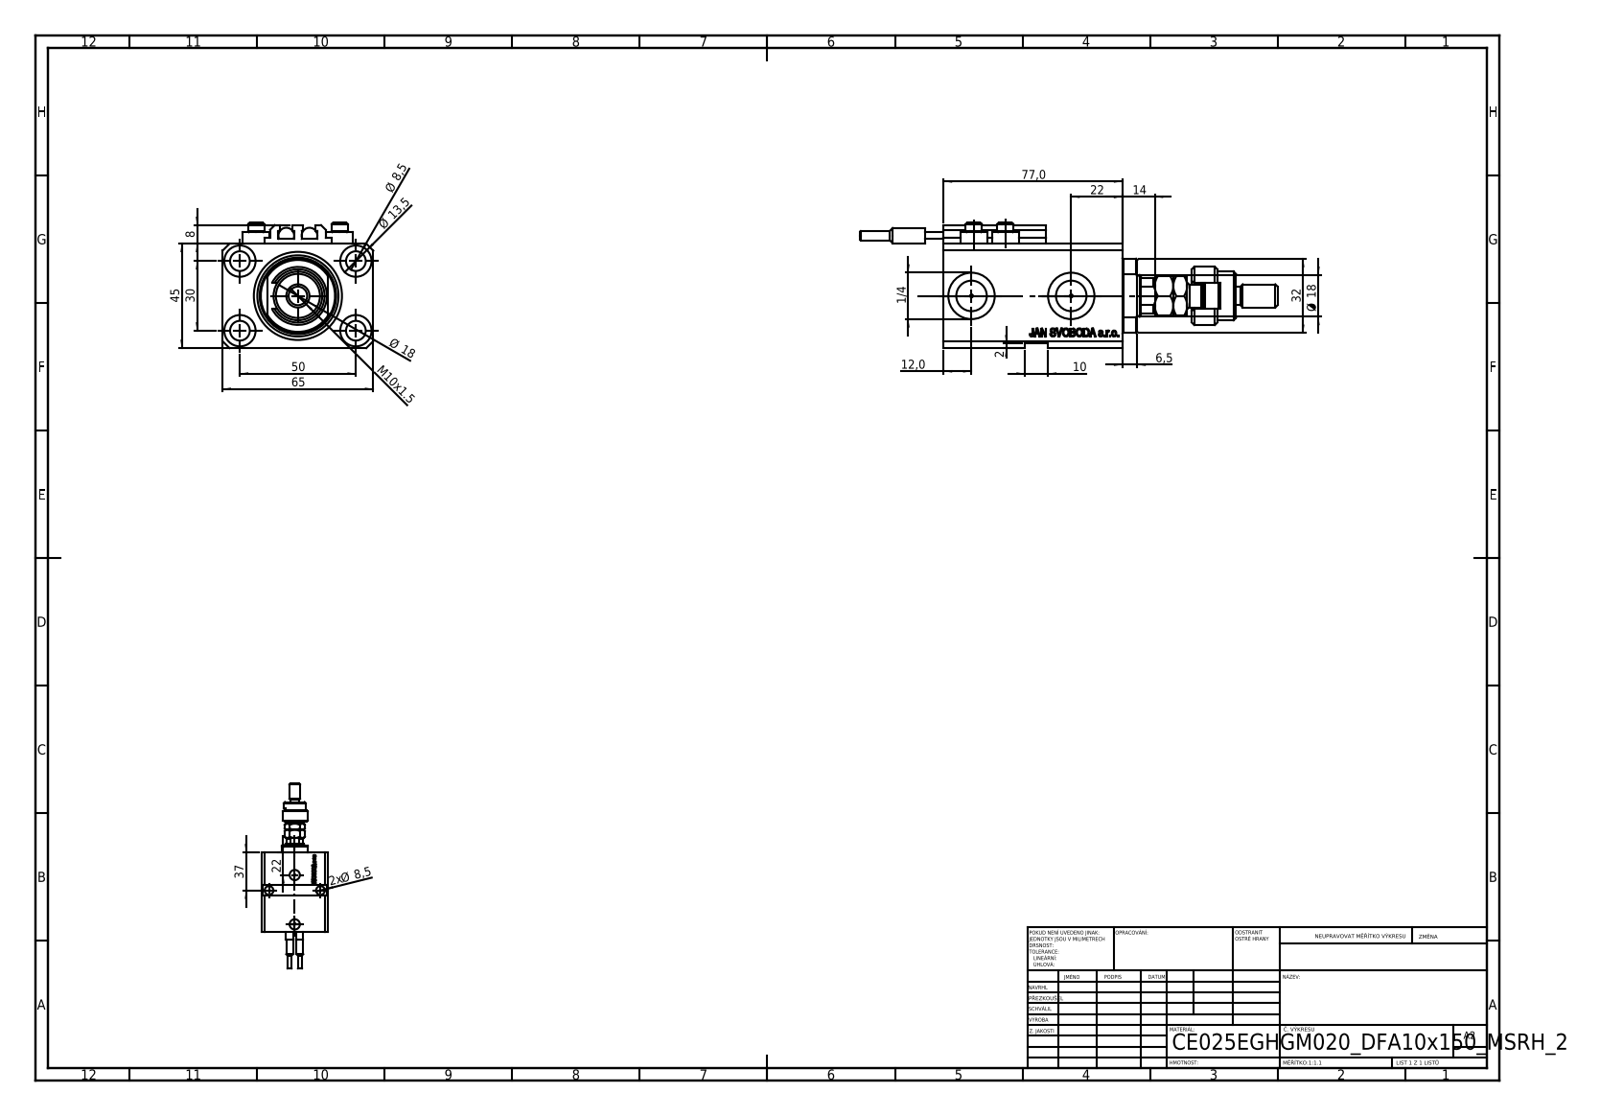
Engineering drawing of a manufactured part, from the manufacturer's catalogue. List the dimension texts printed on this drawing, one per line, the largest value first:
77,0
65
50
45
37
32
30
22
22
Ø 18
Ø 18
14
Ø 13,5
12,0
M10x1.5
10
Ø 8,5
2x Ø 8,5
8
6,5
2
1/4
